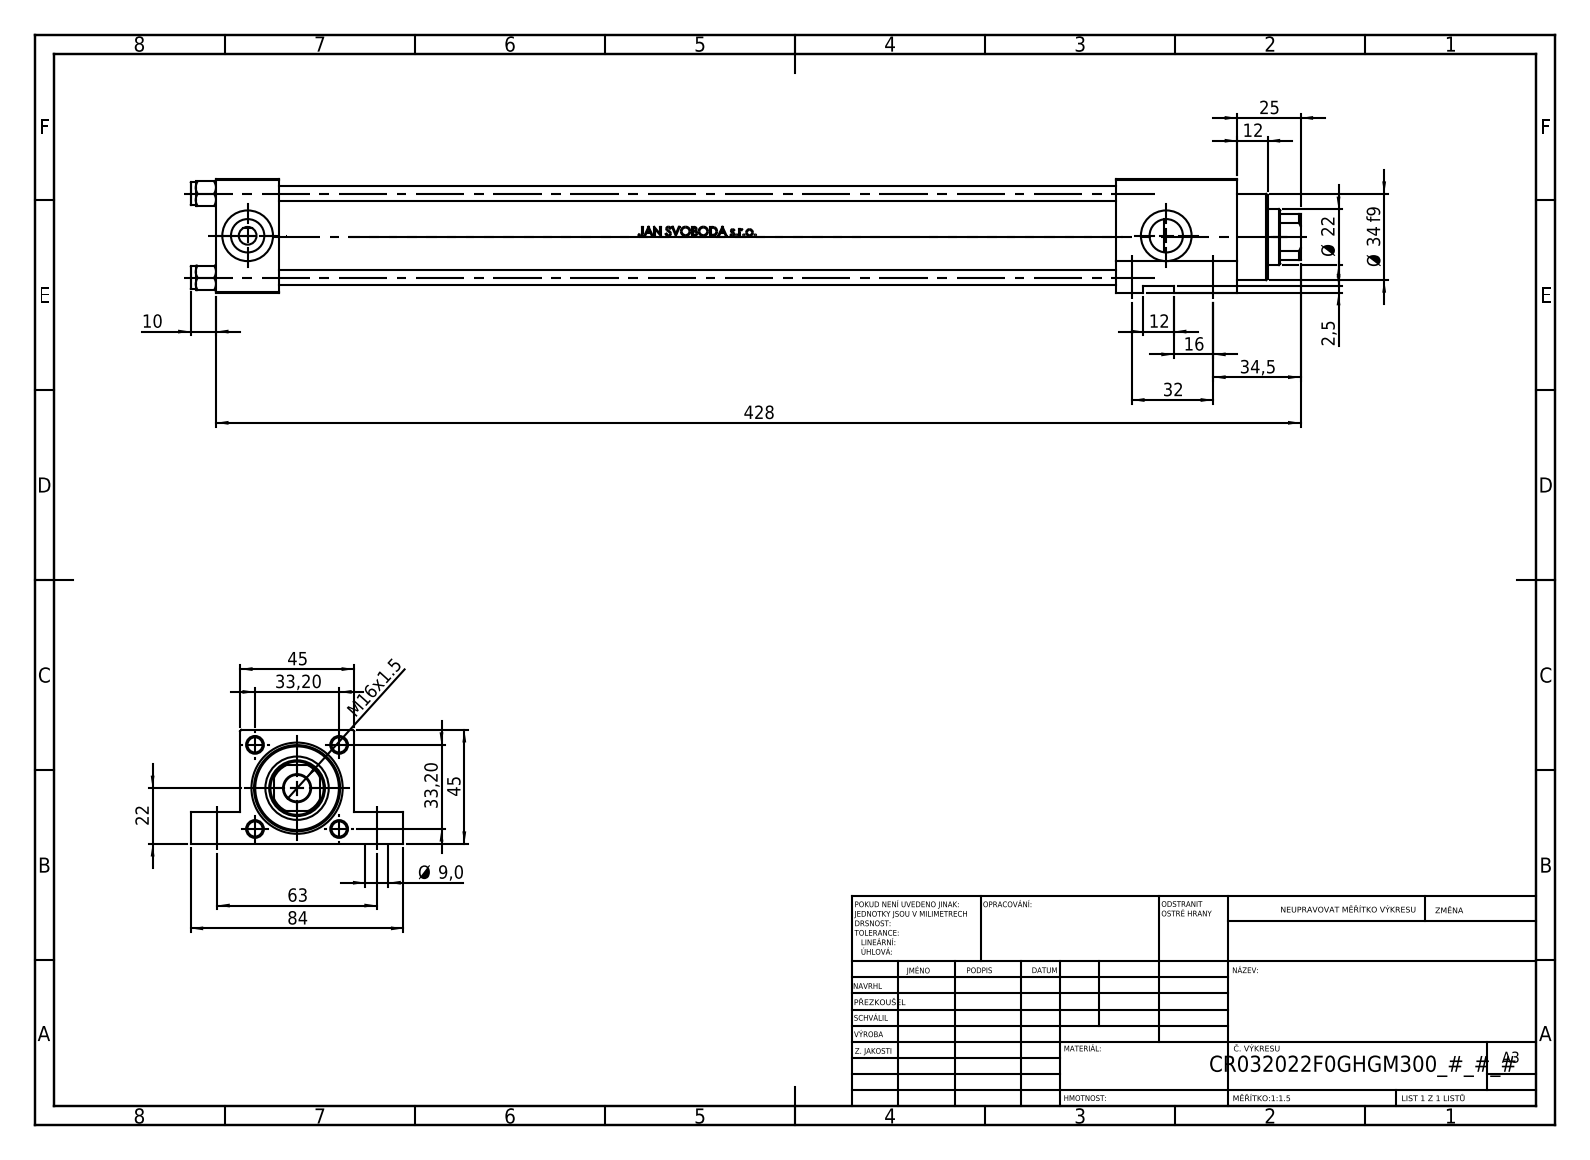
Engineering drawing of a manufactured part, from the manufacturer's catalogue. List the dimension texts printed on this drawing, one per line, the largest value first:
428
84
63
45
45
34,5
Ø 34 f9
33,20
33,20
32
25
Ø 22
22
16
M16x1.5
12
12
10
Ø 9,0
2,5
